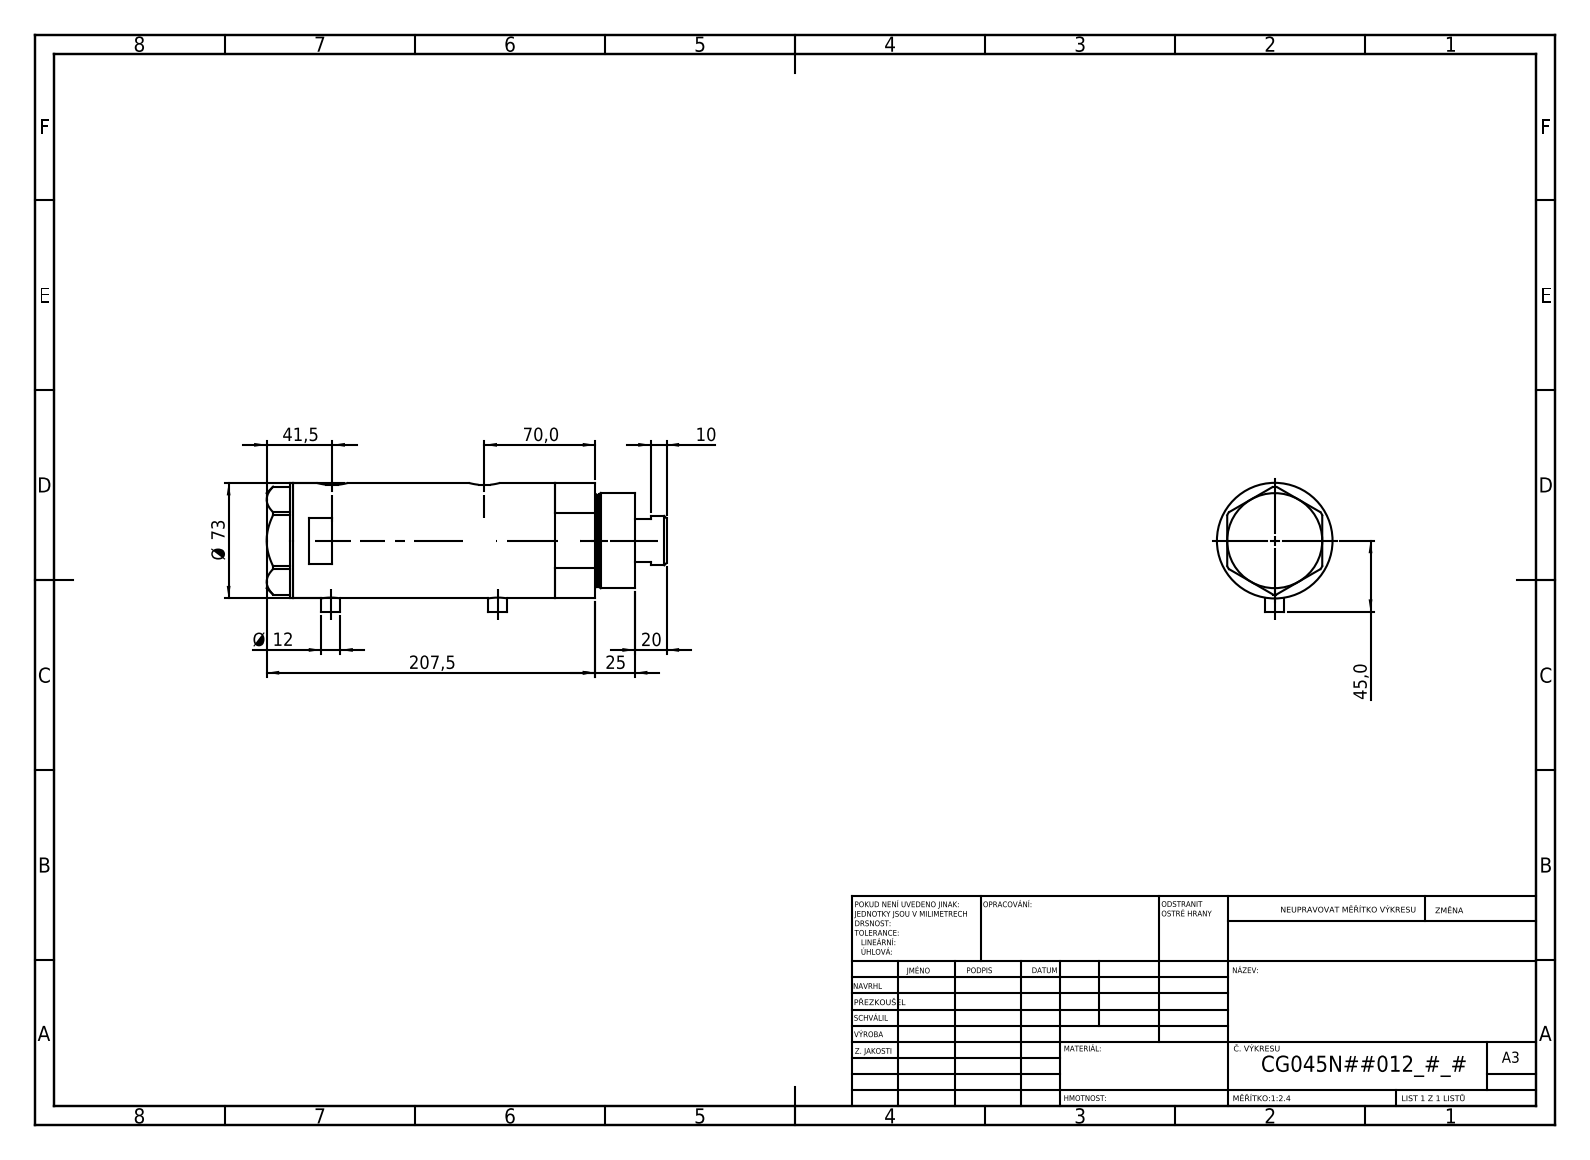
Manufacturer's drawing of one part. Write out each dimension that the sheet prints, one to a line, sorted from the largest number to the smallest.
207,5
Ø 73
70,0
45,0
41,5
25
20
Ø 12
10
